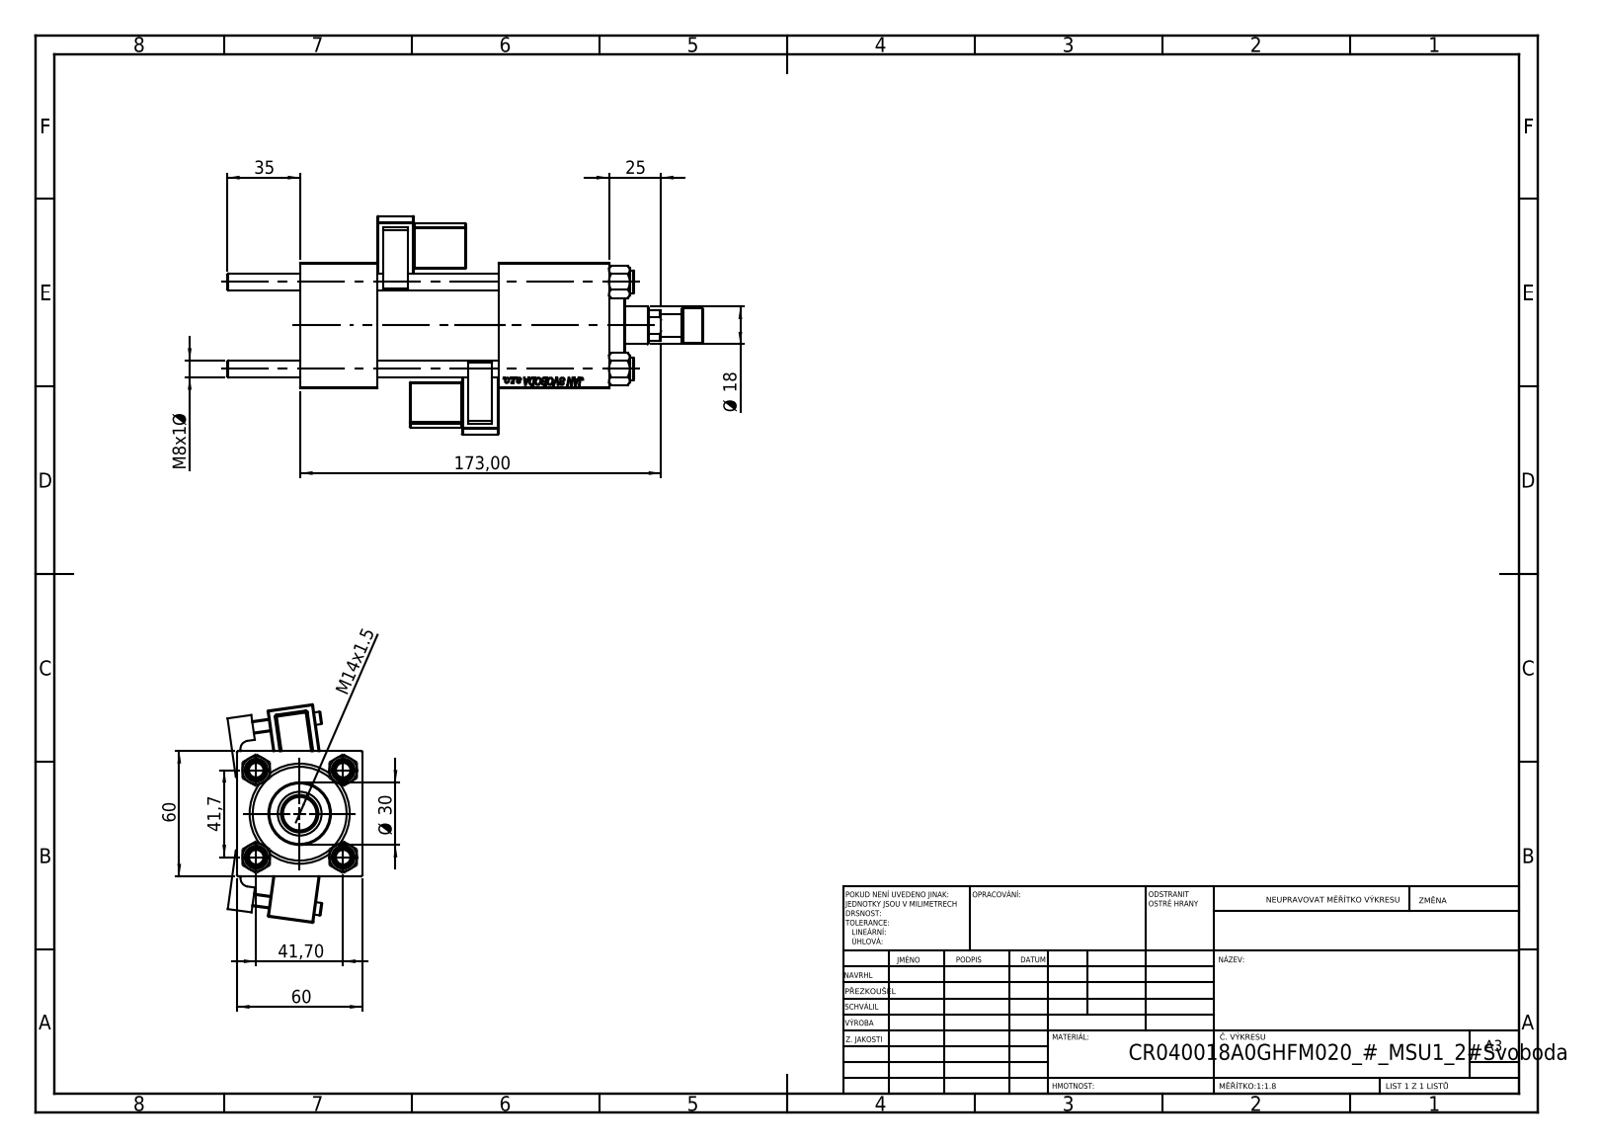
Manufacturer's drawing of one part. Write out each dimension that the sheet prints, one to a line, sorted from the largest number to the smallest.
173,00
60
60
41,7
41,70
35
Ø 30
25
Ø 18
M14x1.5
M8x1 Ø
